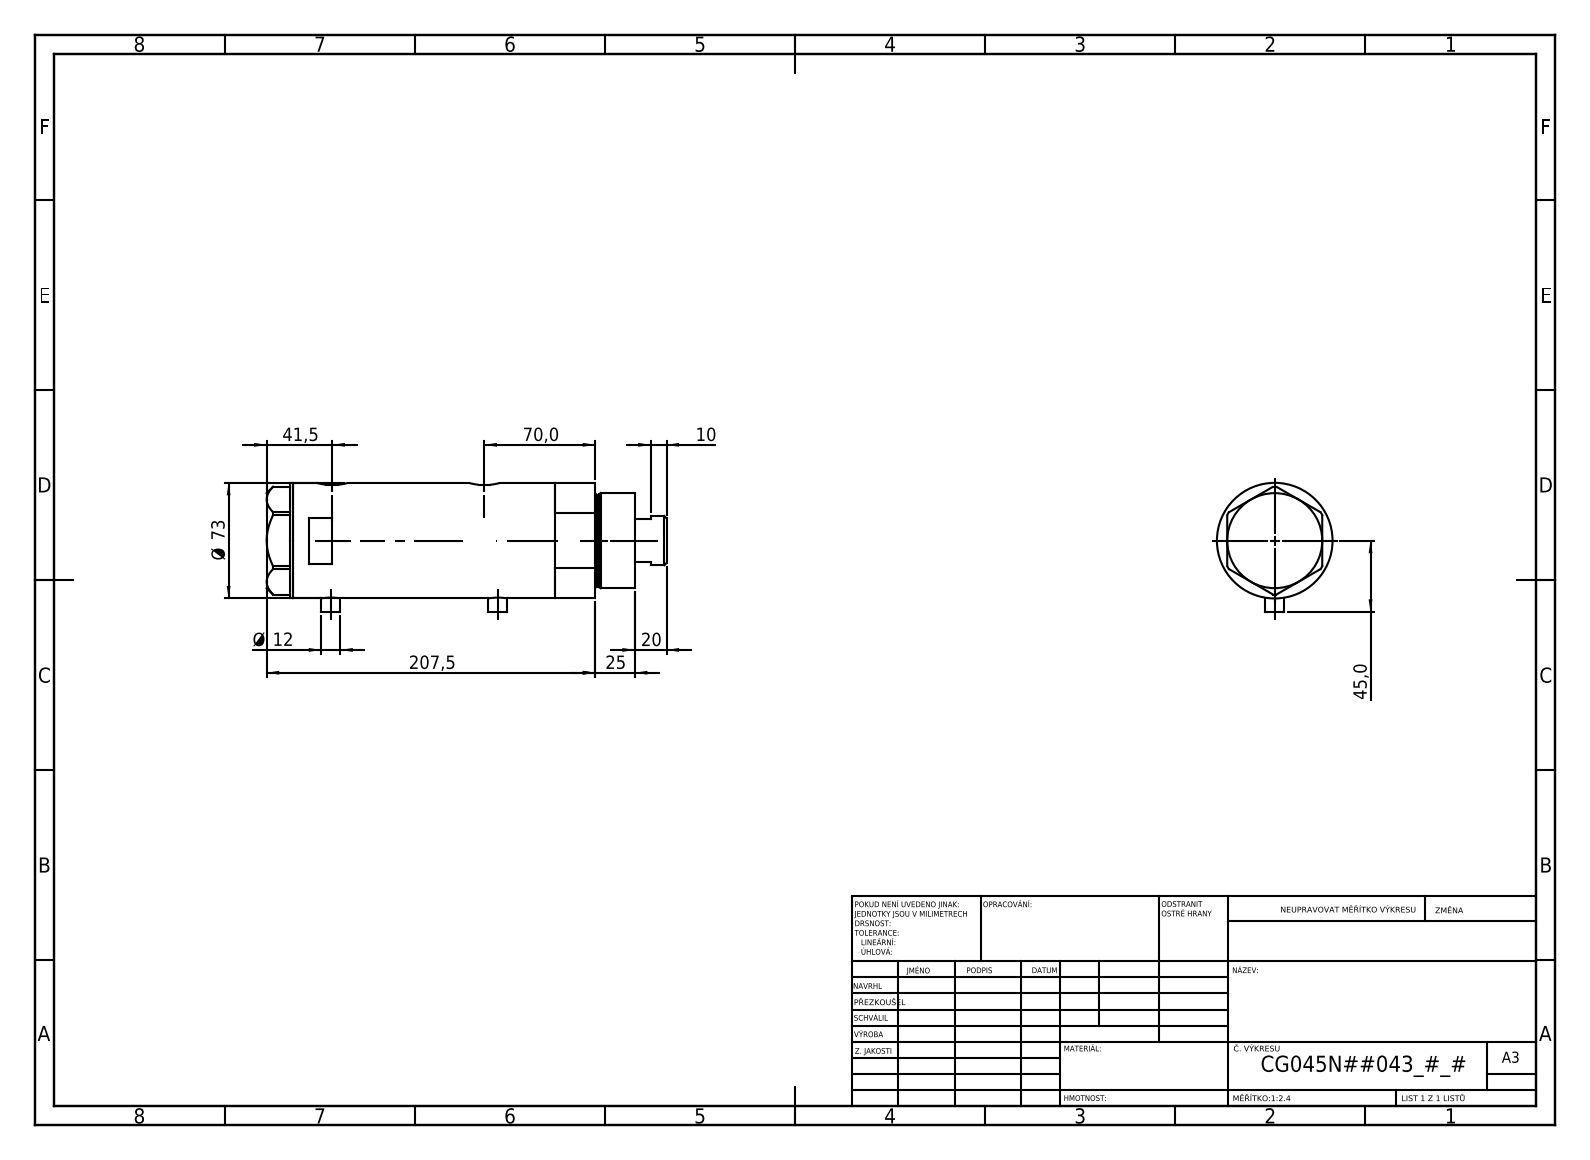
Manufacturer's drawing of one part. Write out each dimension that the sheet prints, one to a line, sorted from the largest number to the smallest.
207,5
Ø 73
70,0
45,0
41,5
25
20
Ø 12
10
